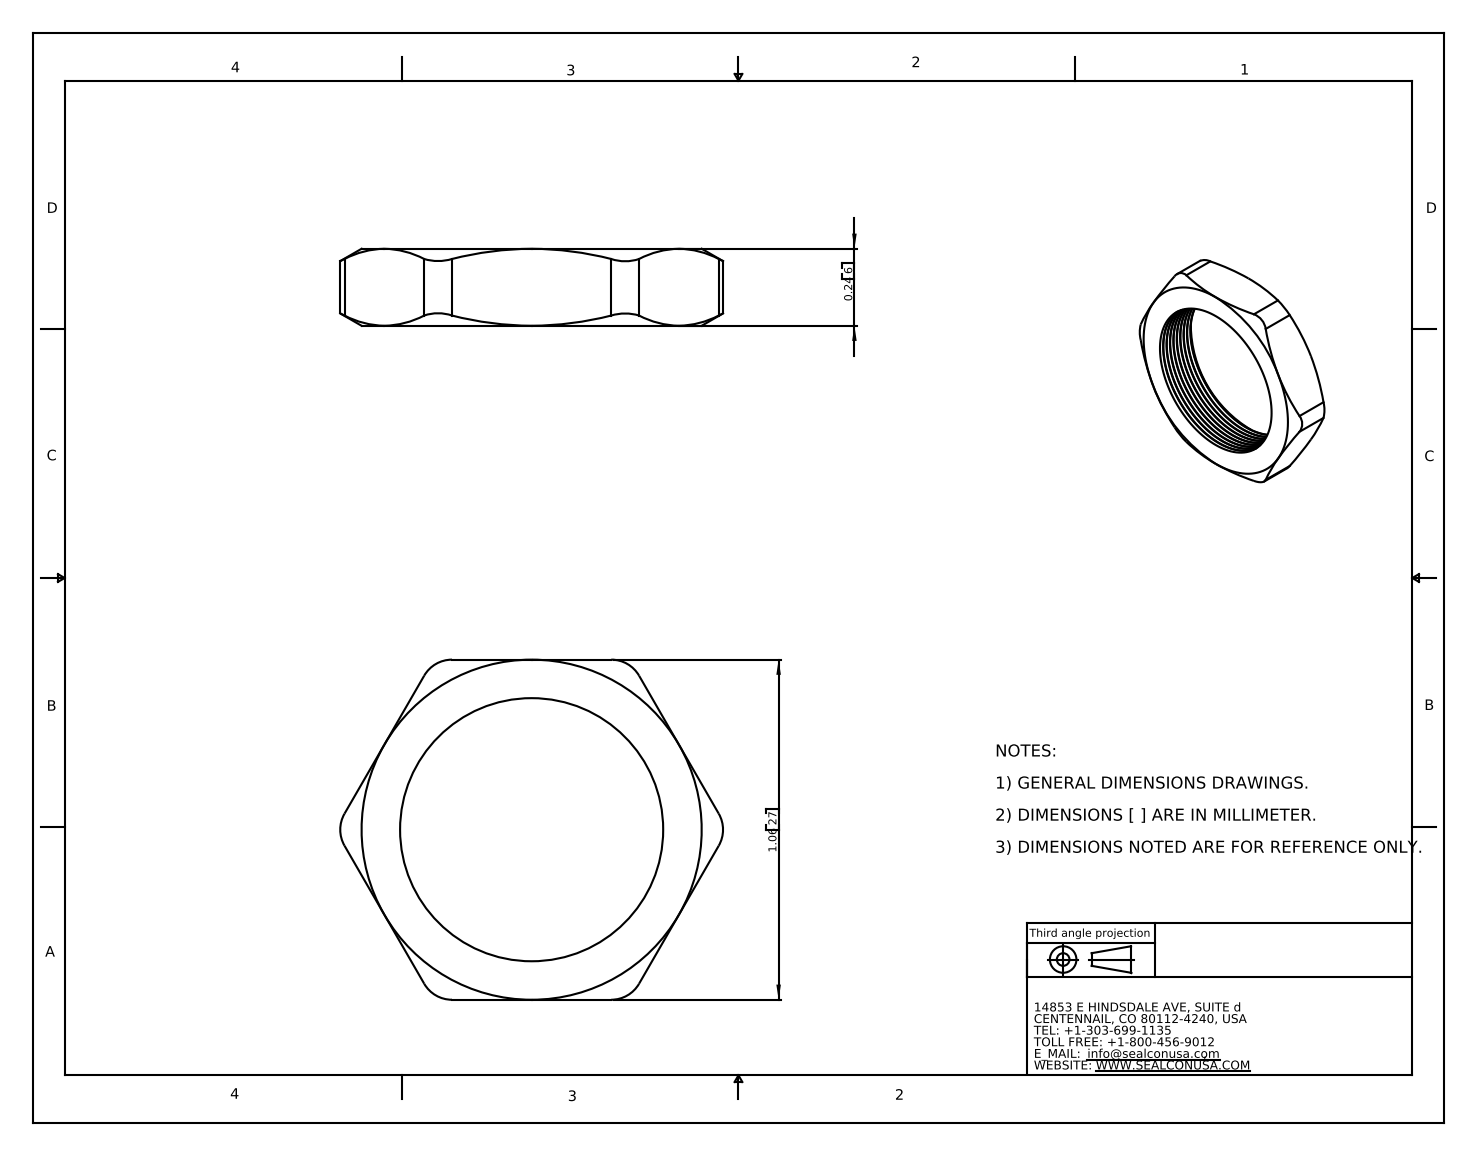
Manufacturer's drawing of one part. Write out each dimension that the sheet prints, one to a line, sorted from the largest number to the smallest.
1.06 27
0.24 6
